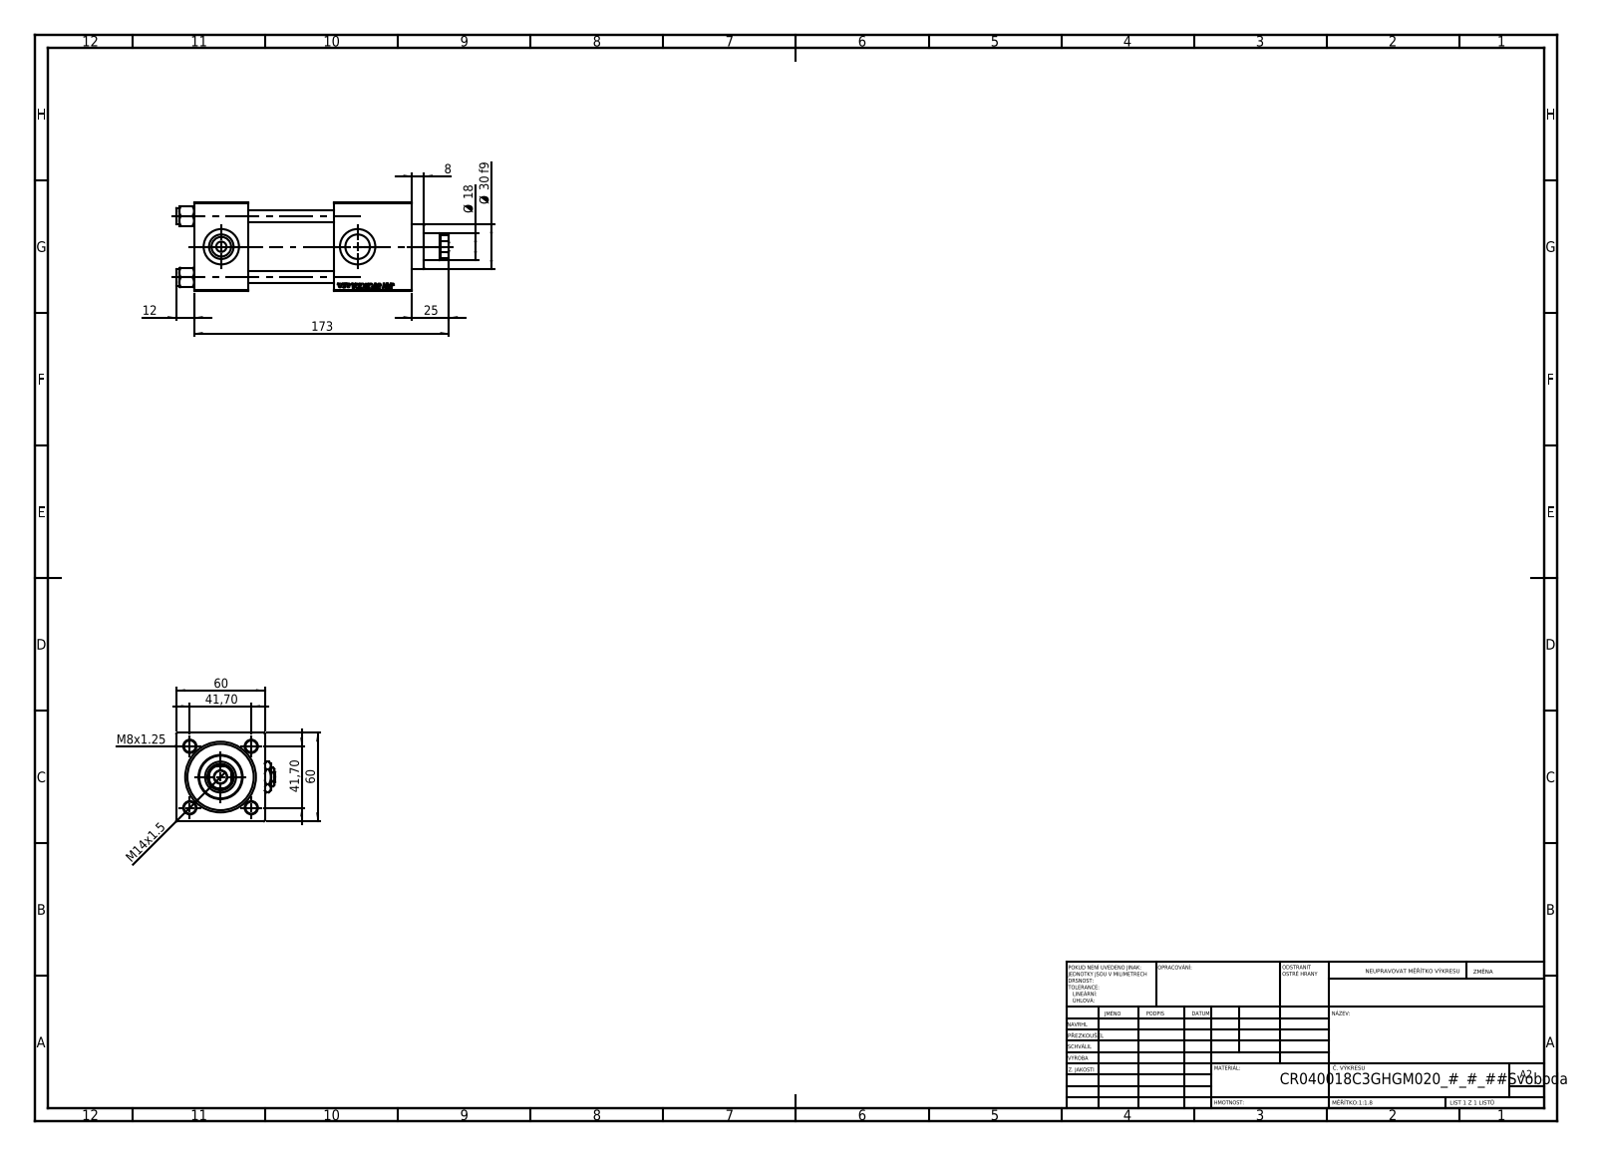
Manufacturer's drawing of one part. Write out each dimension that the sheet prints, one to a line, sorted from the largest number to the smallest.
173
60
60
41,70
41,70
Ø 30 f9
25
Ø 18
M14x1.5
12
8
M8x1.25
